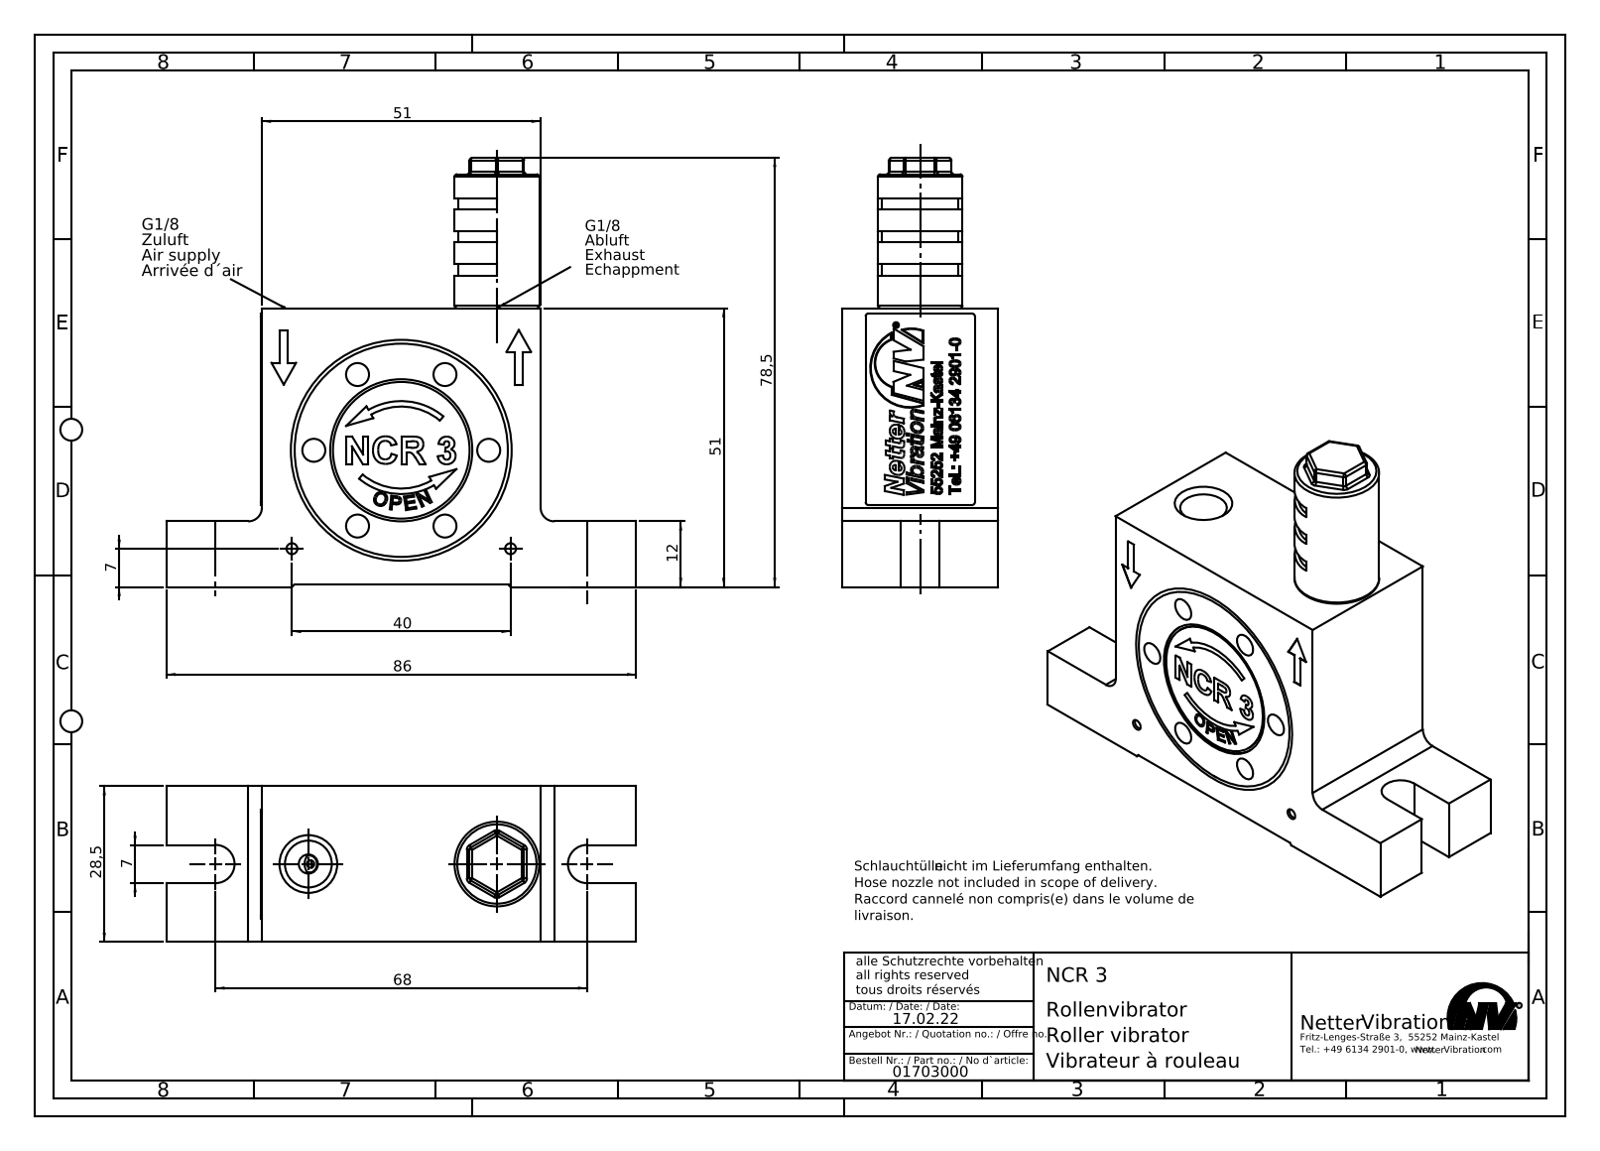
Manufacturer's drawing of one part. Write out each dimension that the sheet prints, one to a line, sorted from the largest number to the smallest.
86
78,5
68
51
51
40
28,5
12
7
7
